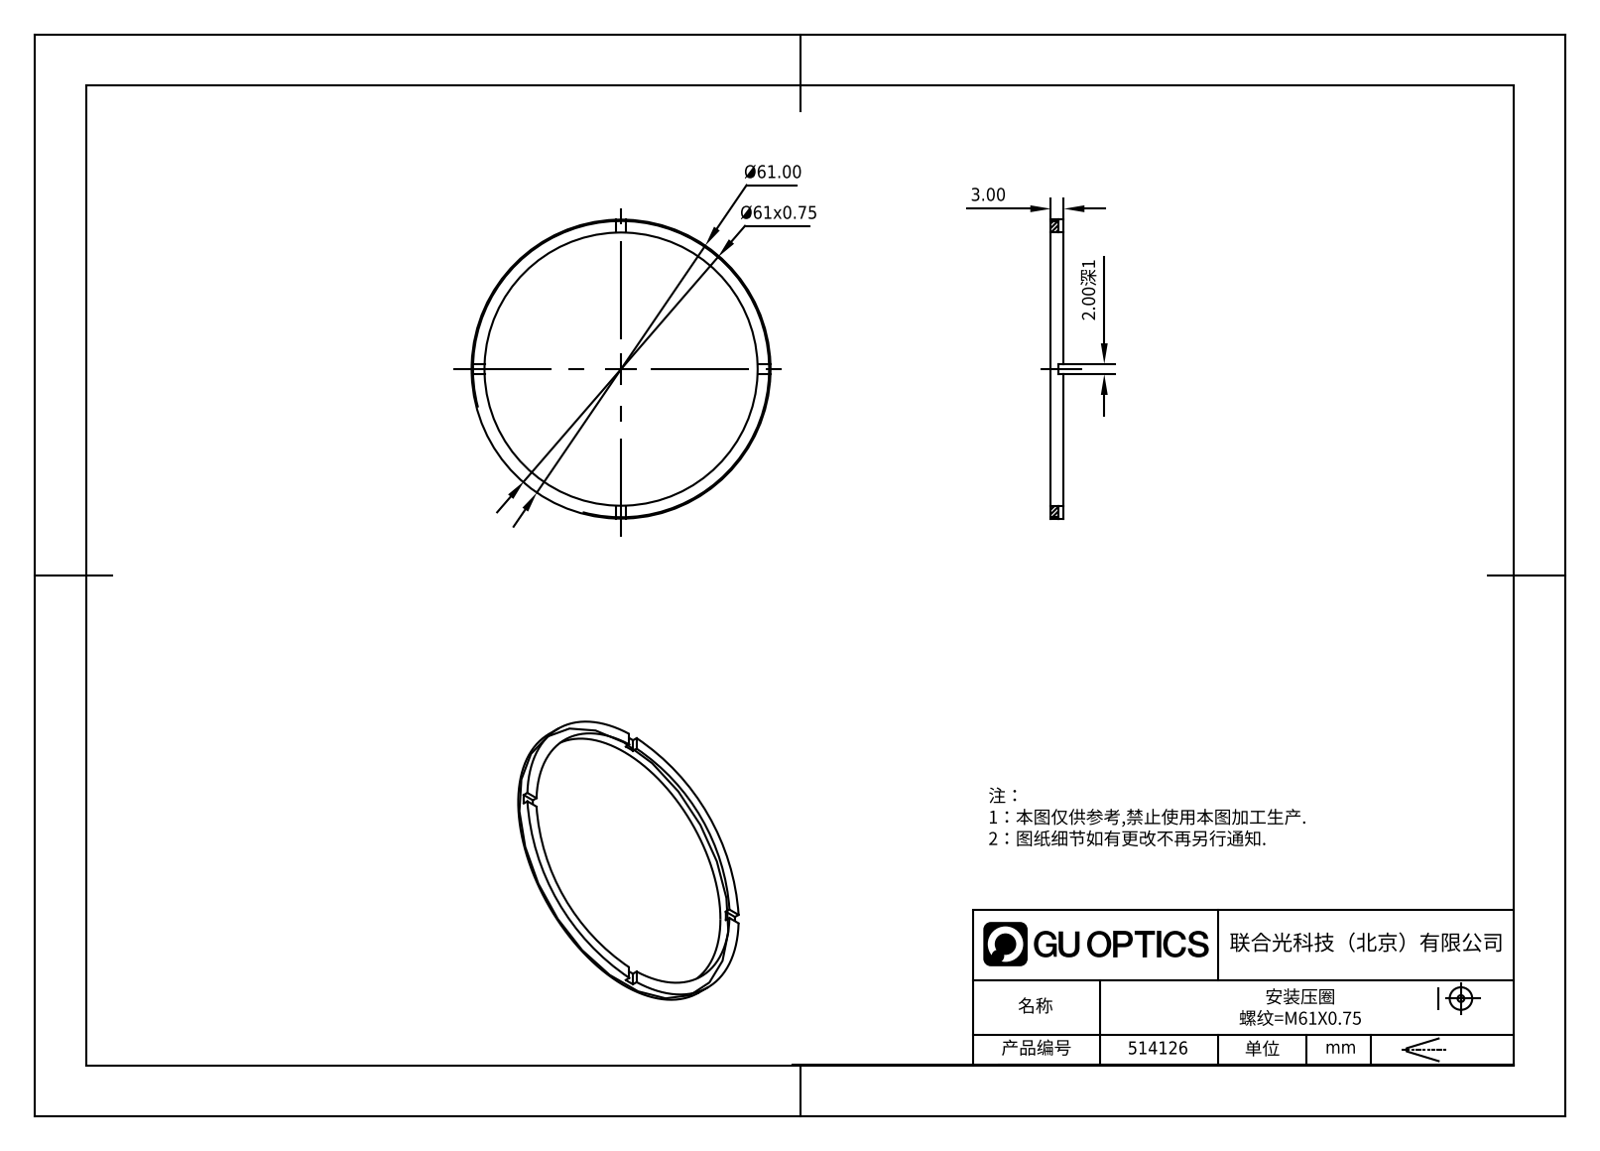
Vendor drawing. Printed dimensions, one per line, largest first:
Ø61.00
Ø61x0.75
3.00
2.00深1
